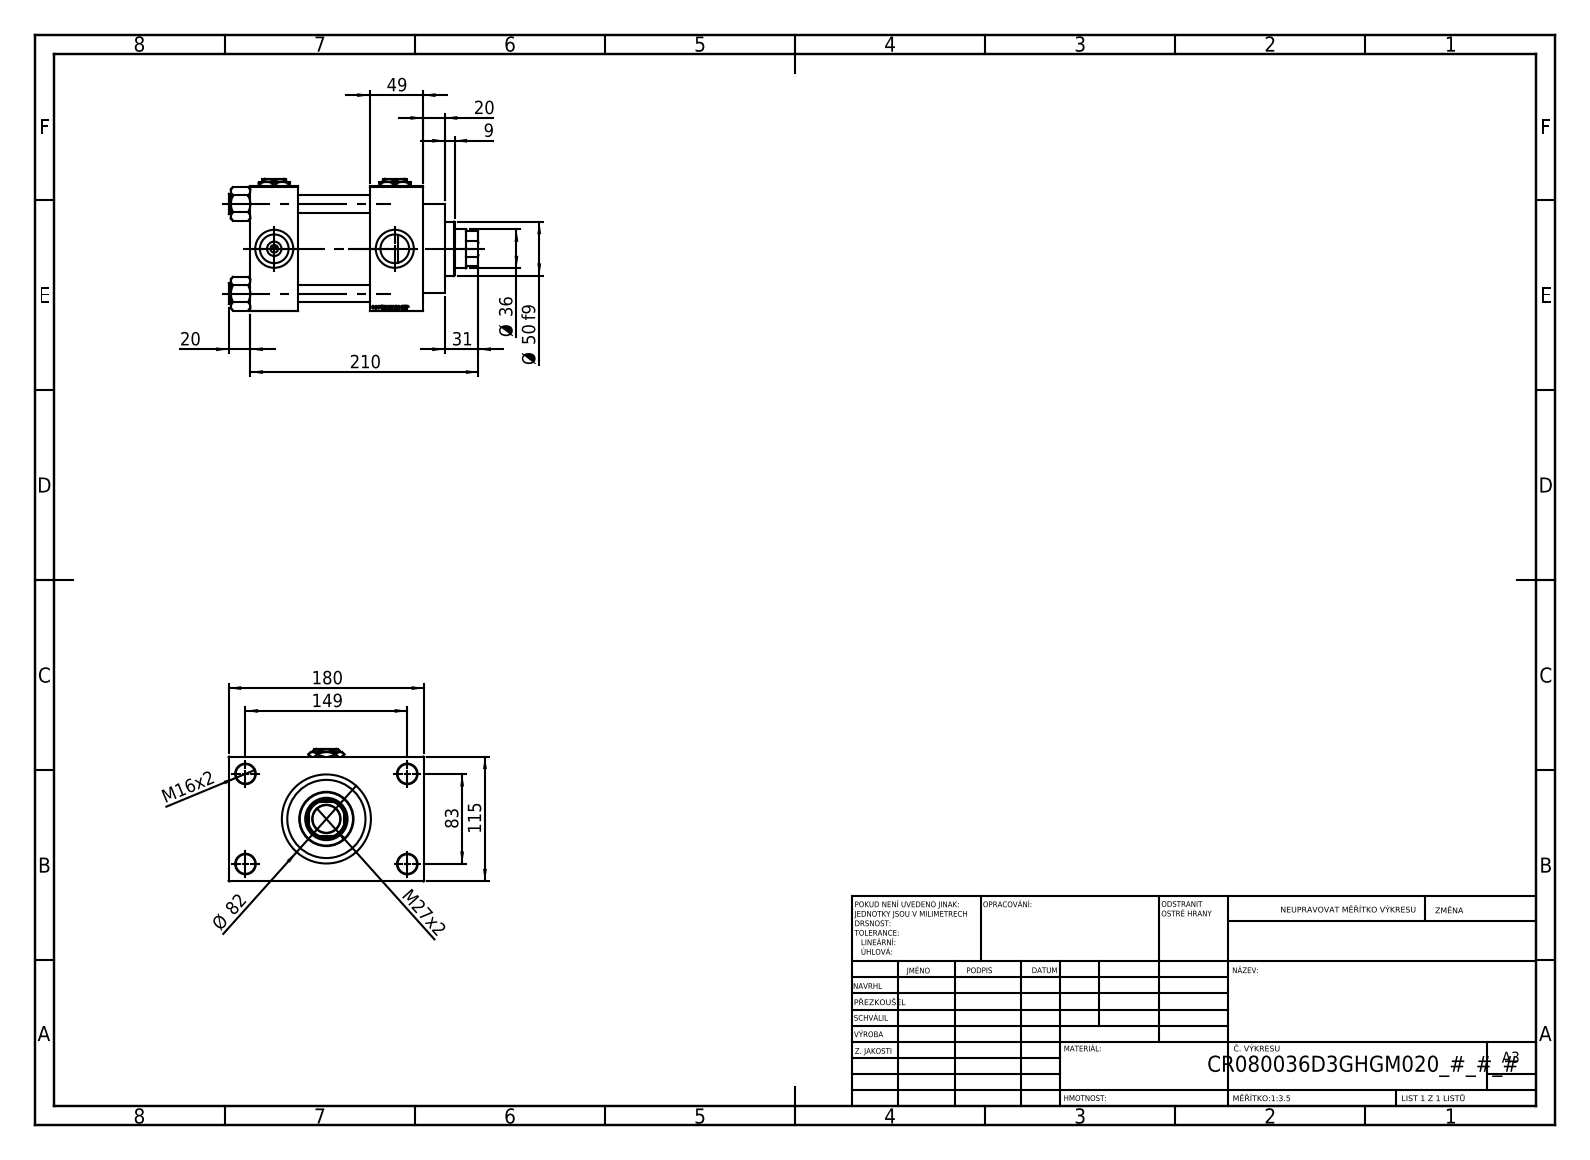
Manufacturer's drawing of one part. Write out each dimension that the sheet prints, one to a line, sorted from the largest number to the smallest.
210
180
149
115
83
Ø 82
Ø 50 f9
49
Ø 36
31
M27x2
20
20
M16x2
9
